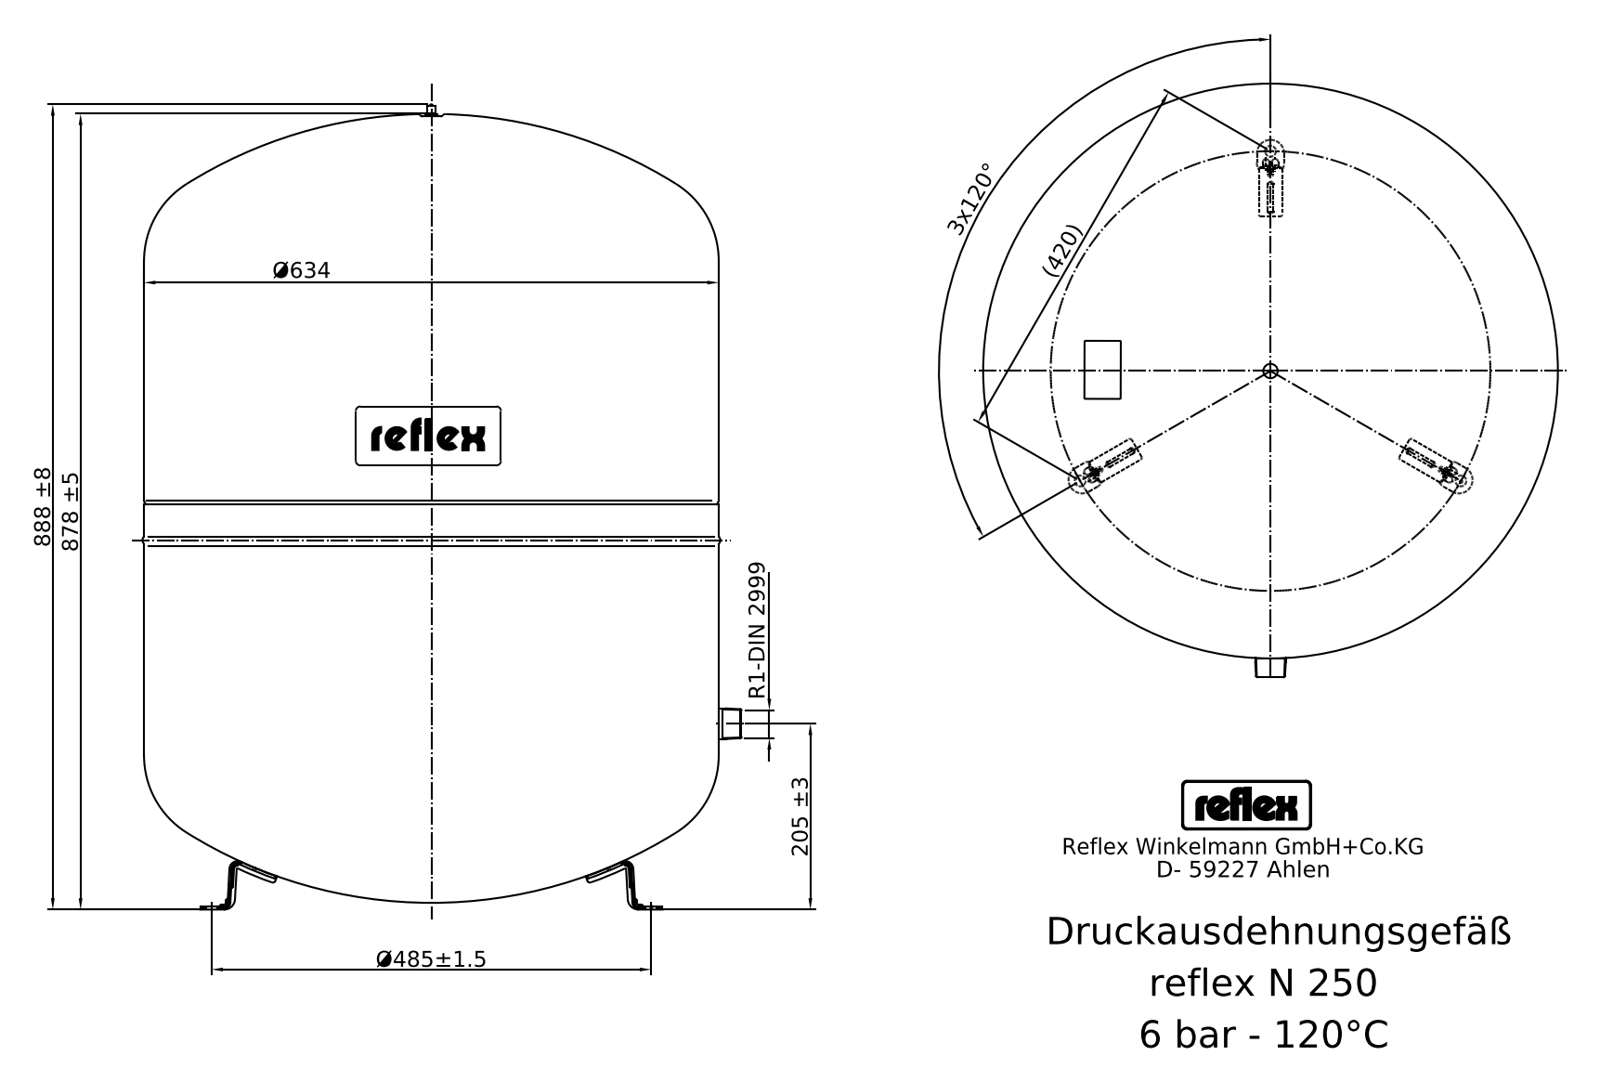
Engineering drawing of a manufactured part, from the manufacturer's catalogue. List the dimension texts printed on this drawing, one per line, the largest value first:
888 ±8
878 ±5
Ø634
Ø485±1.5
(420)
205 ±3
3x120°
R1-DIN 2999
